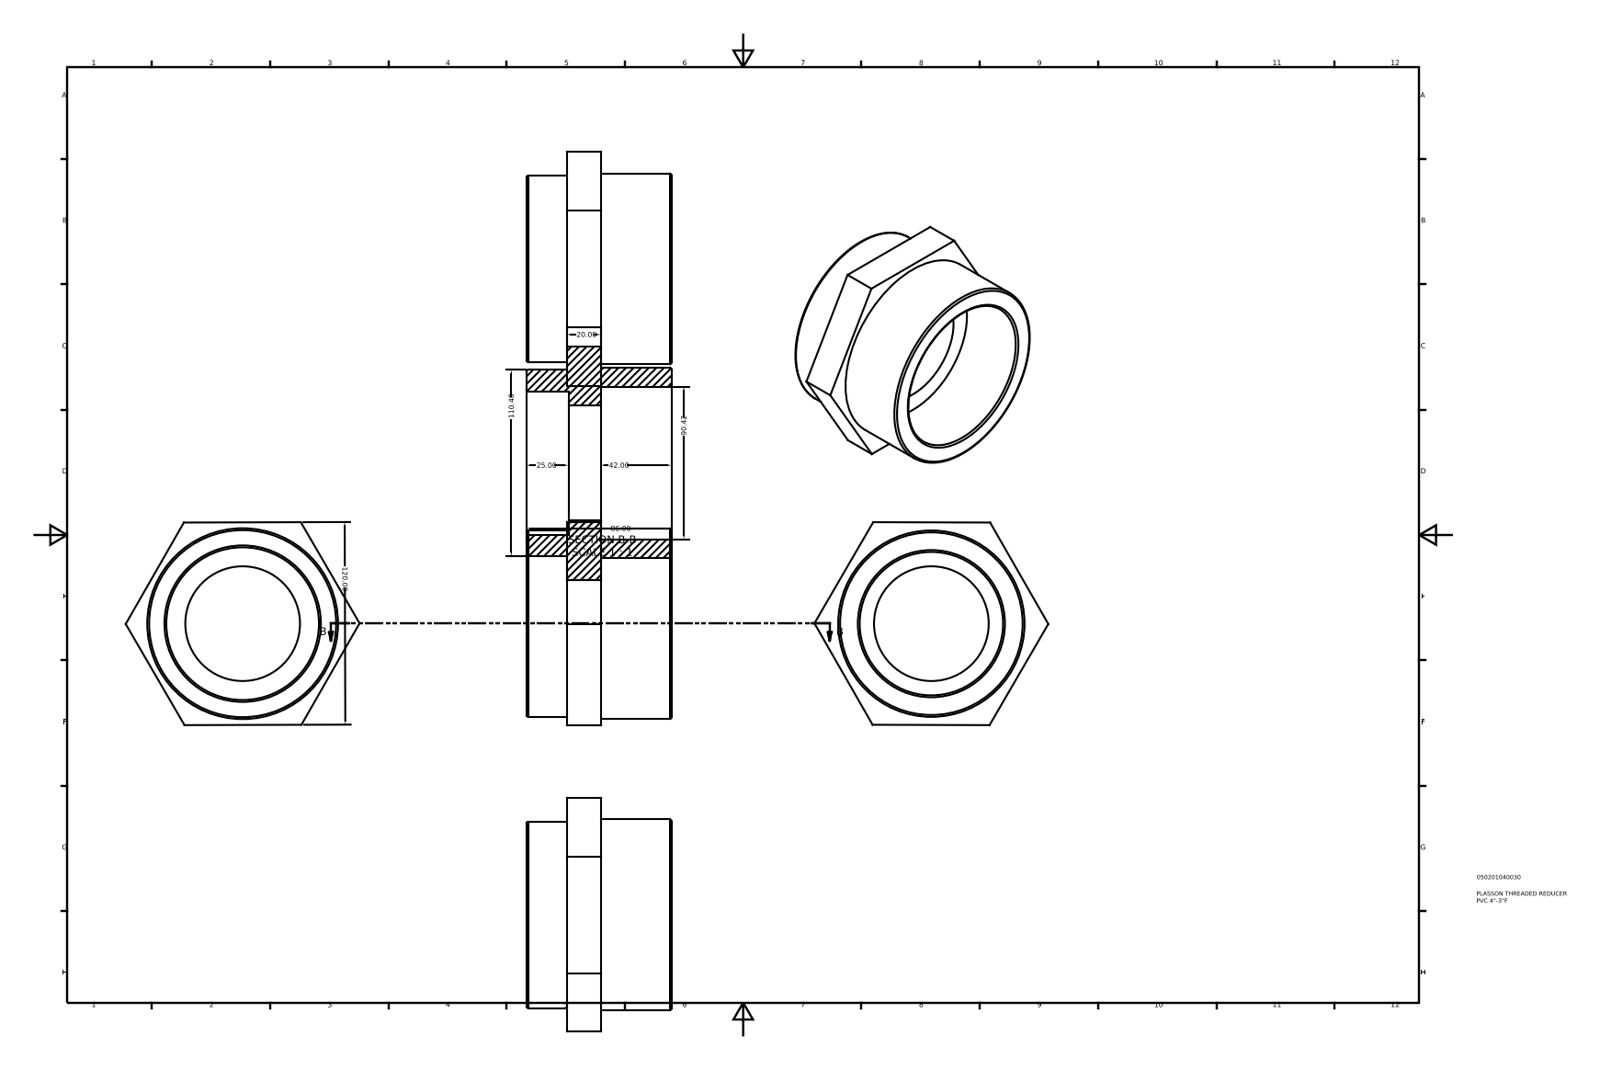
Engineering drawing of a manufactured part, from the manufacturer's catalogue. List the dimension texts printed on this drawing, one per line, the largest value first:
120.00
110.40
90.42
86.00
42.00
25.00
20.00
